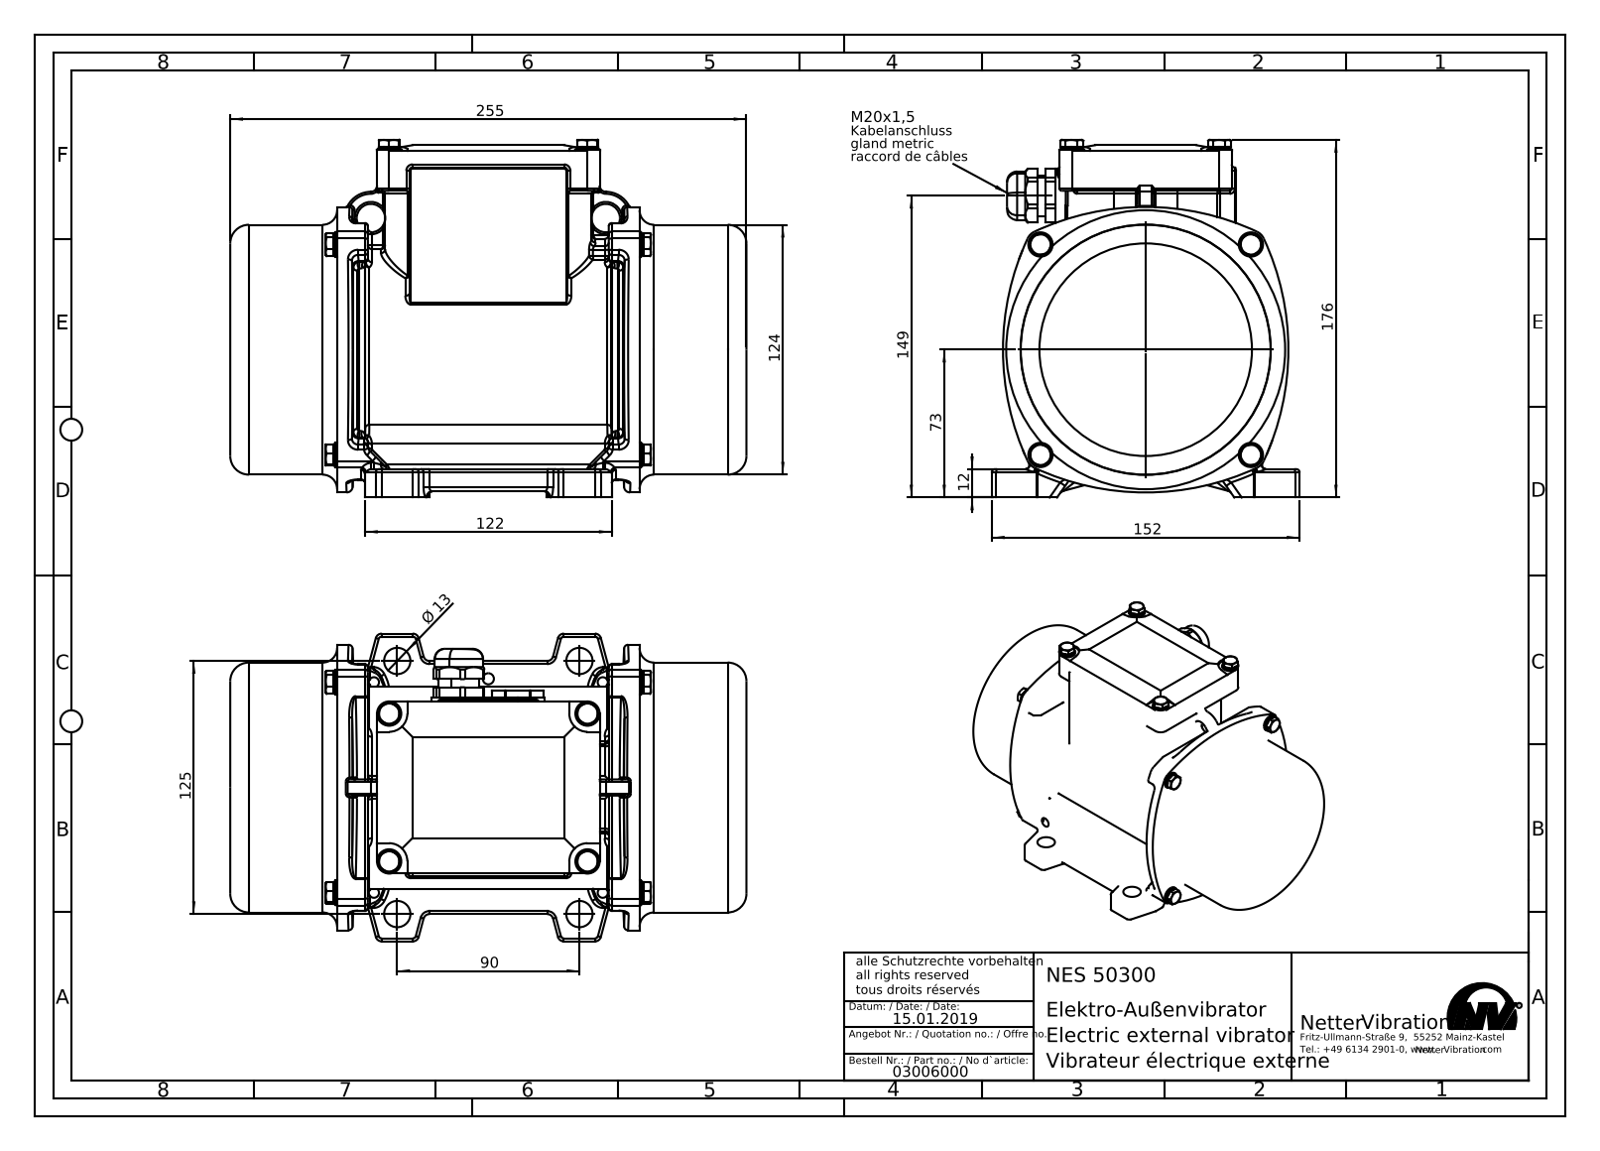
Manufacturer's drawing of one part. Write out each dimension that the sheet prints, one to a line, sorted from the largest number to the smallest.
255
176
152
149
125
124
122
90
73
Ø 13
12
